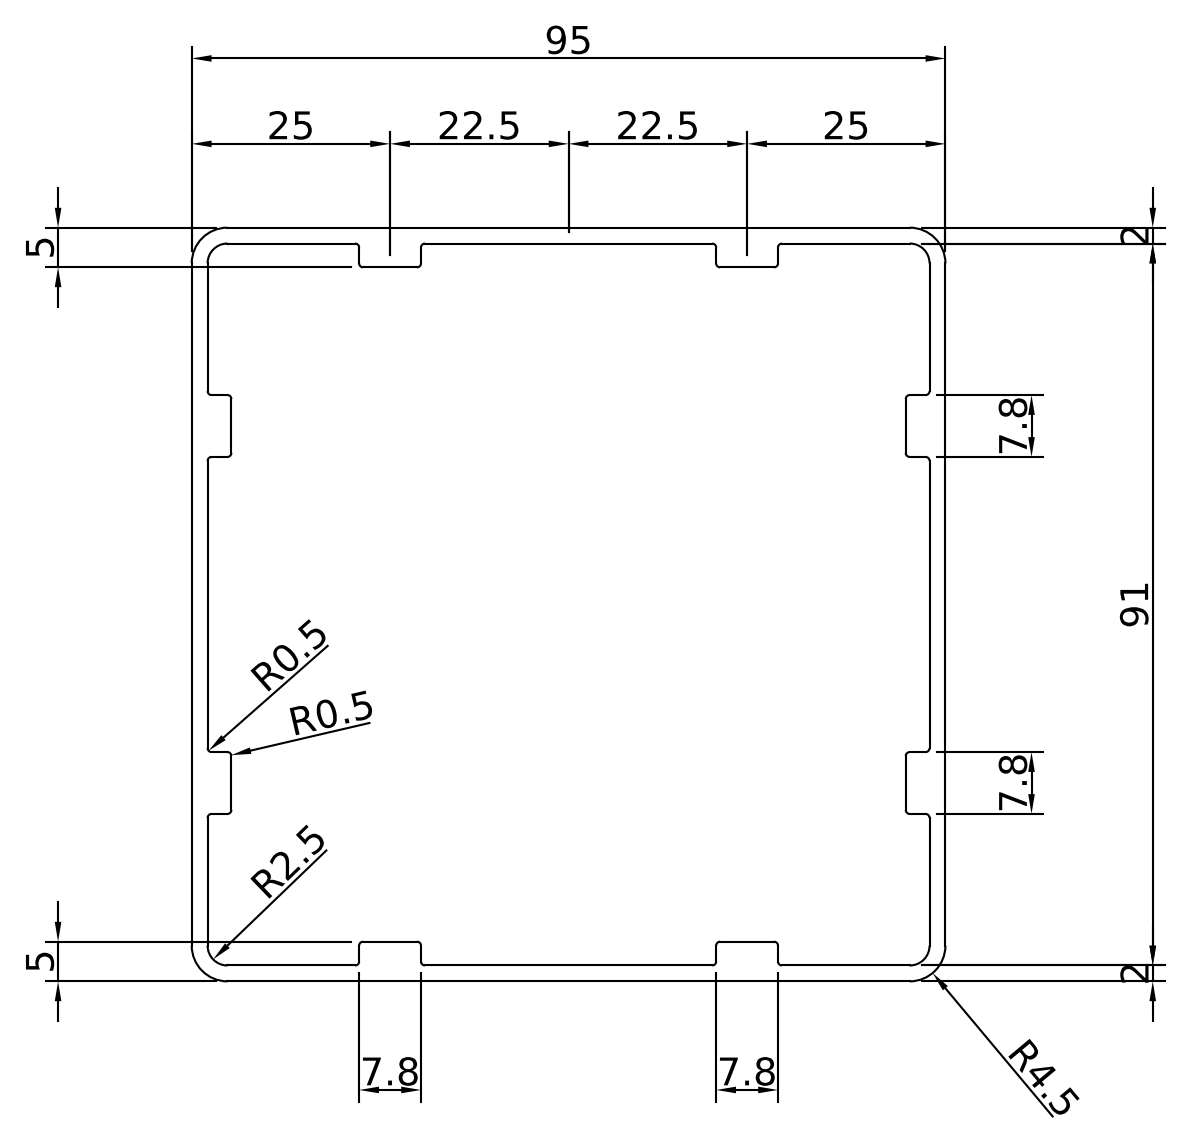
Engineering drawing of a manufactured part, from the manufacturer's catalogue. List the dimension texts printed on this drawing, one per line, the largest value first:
95
91
25
25
22.5
22.5
7.8
7.8
7.8
7.8
5
5
R4.5
R2.5
2
2
R0.5
R0.5
